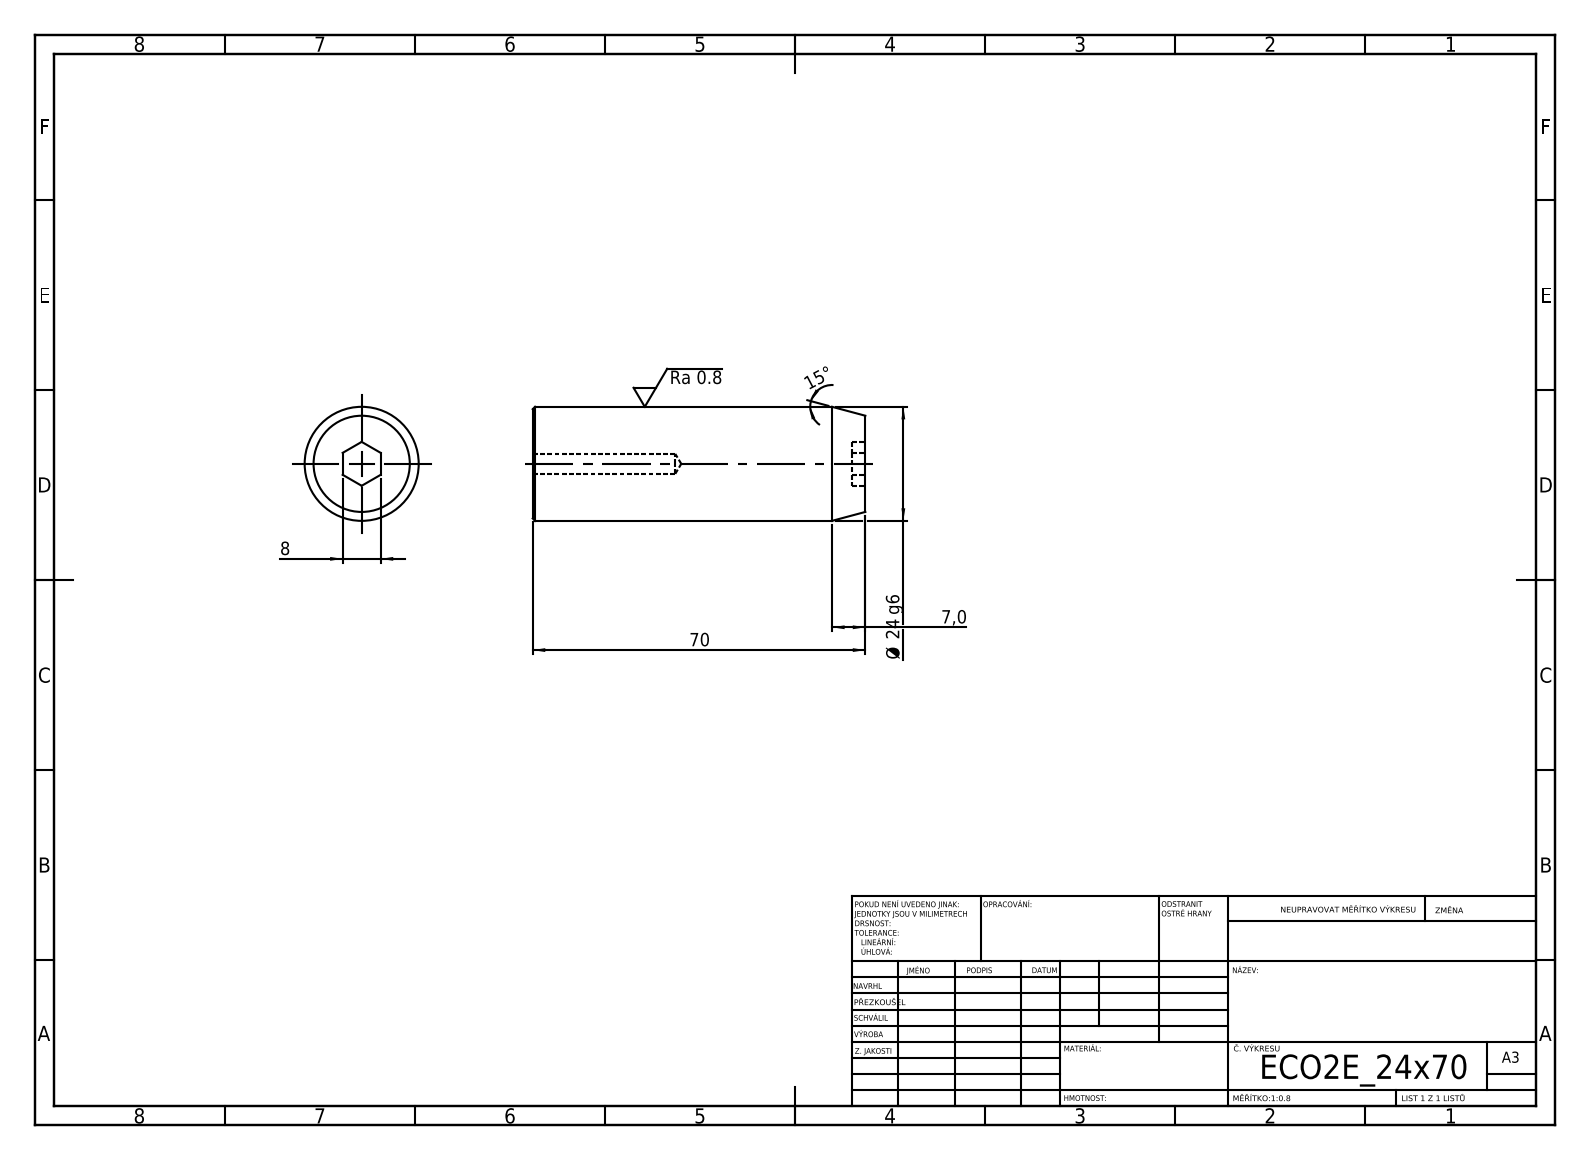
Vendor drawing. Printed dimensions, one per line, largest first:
70
Ø 24 g6
15°
8
7,0
